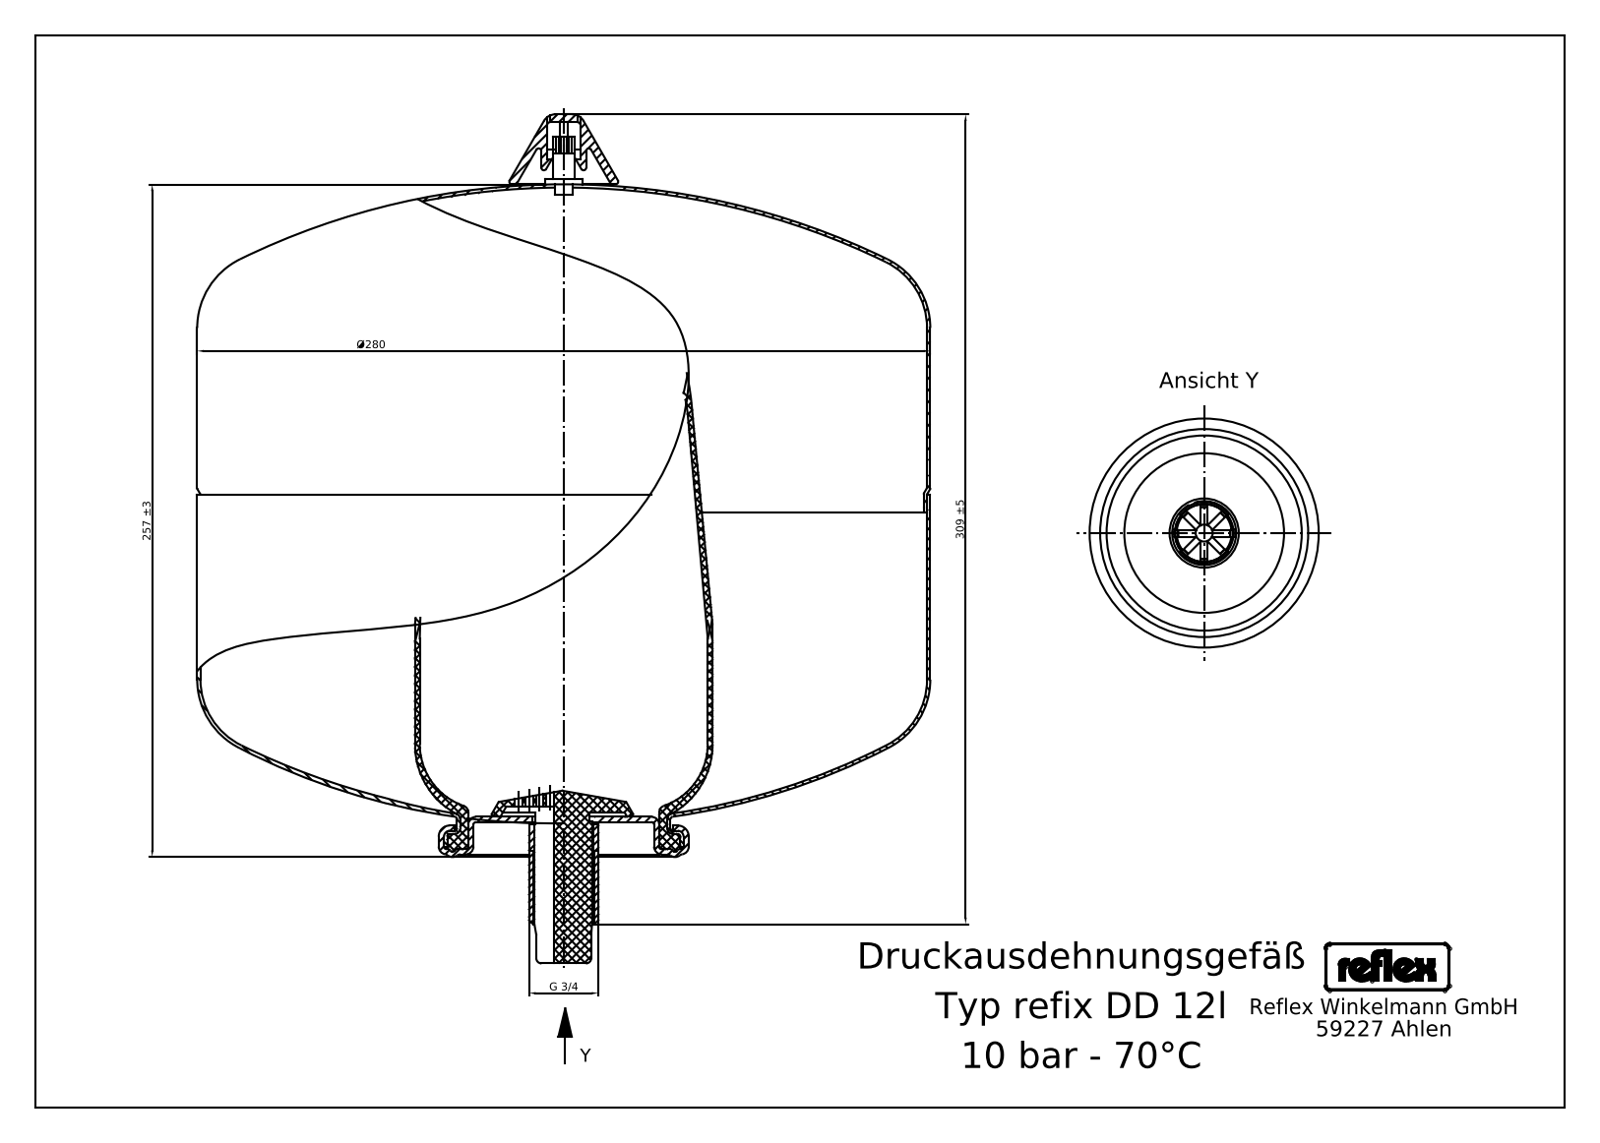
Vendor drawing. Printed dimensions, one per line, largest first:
309 ±5
Ø280
257 ±3
G 3/4
